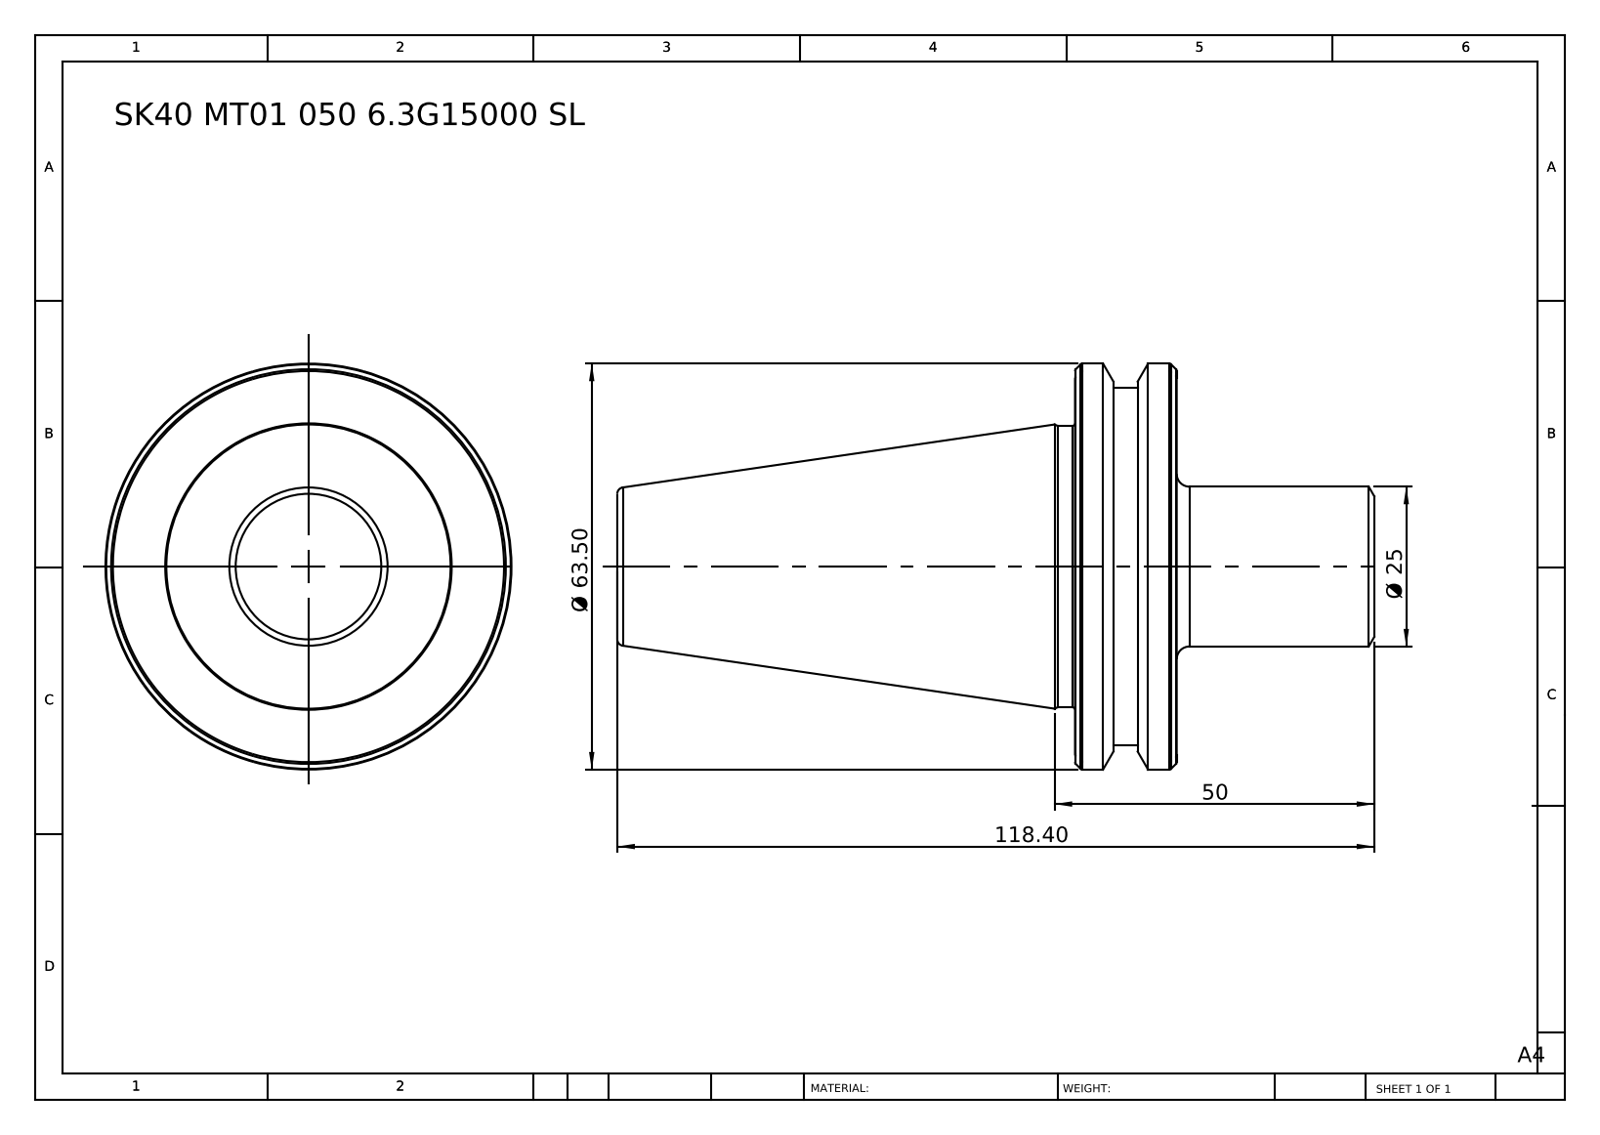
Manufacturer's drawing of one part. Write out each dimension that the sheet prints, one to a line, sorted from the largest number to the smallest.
118.40
Ø 63.50
50
Ø 25
